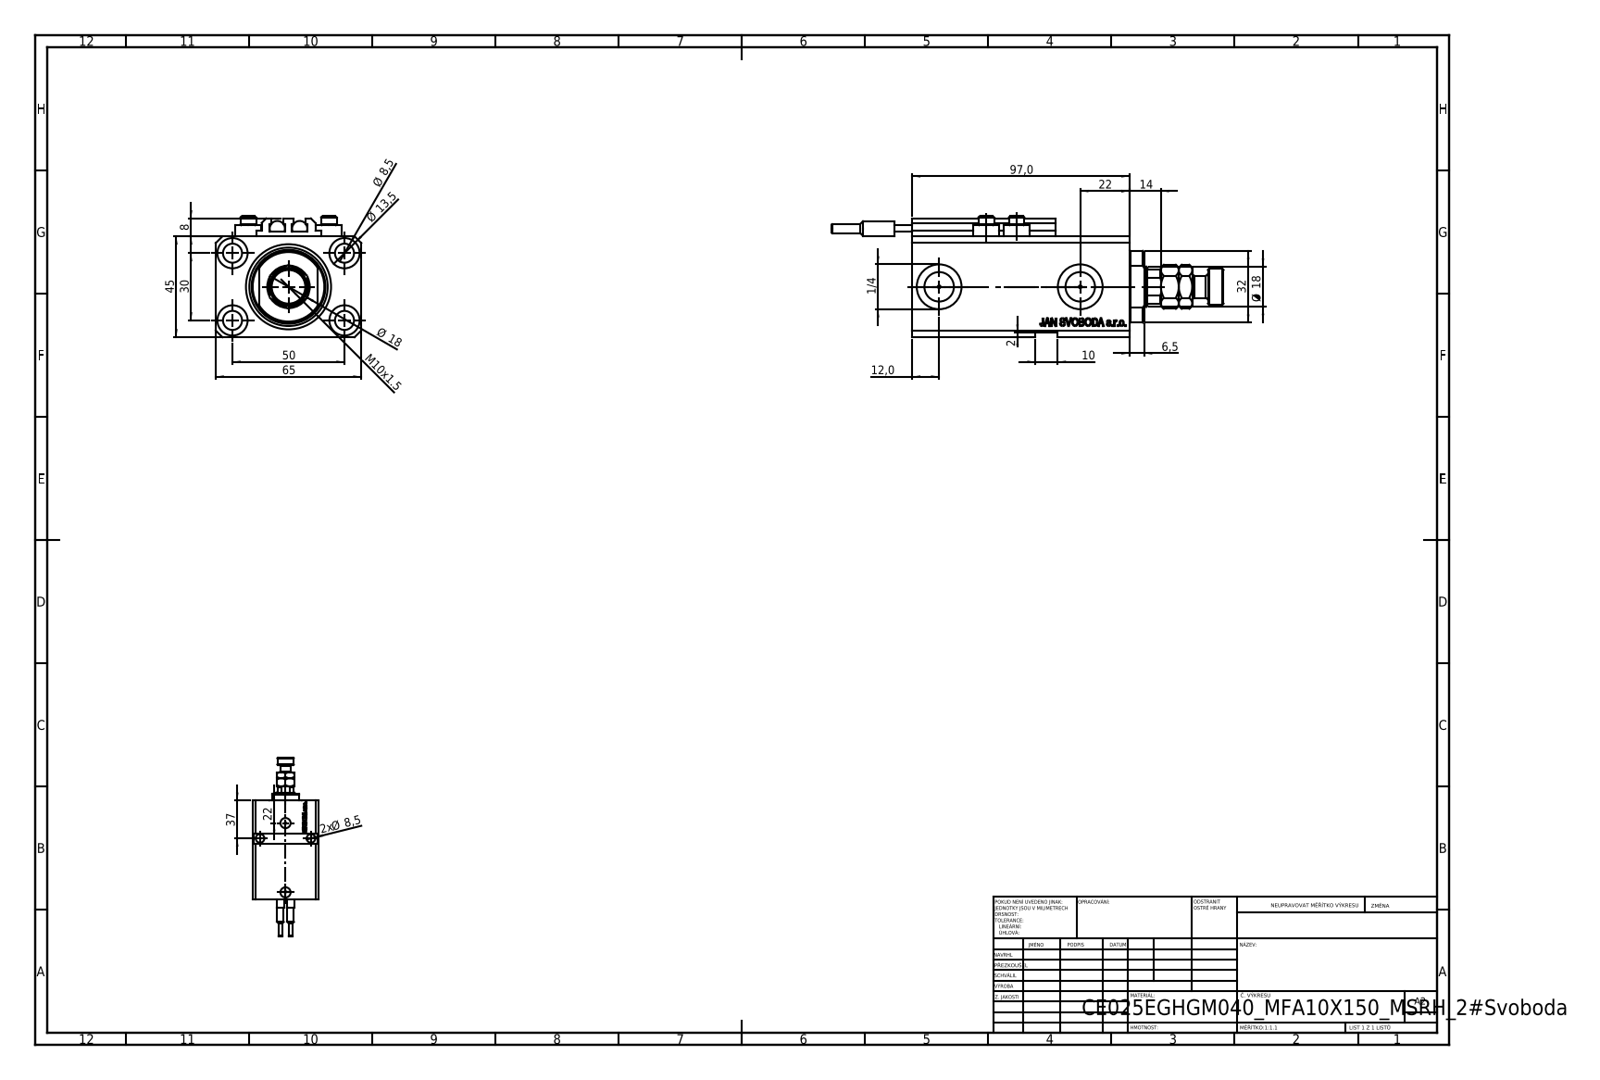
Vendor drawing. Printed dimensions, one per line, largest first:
97,0
65
50
45
37
32
30
22
22
Ø 18
Ø 18
14
Ø 13,5
12,0
M10x1.5
10
Ø 8,5
2x Ø 8,5
8
6,5
2
1/4
